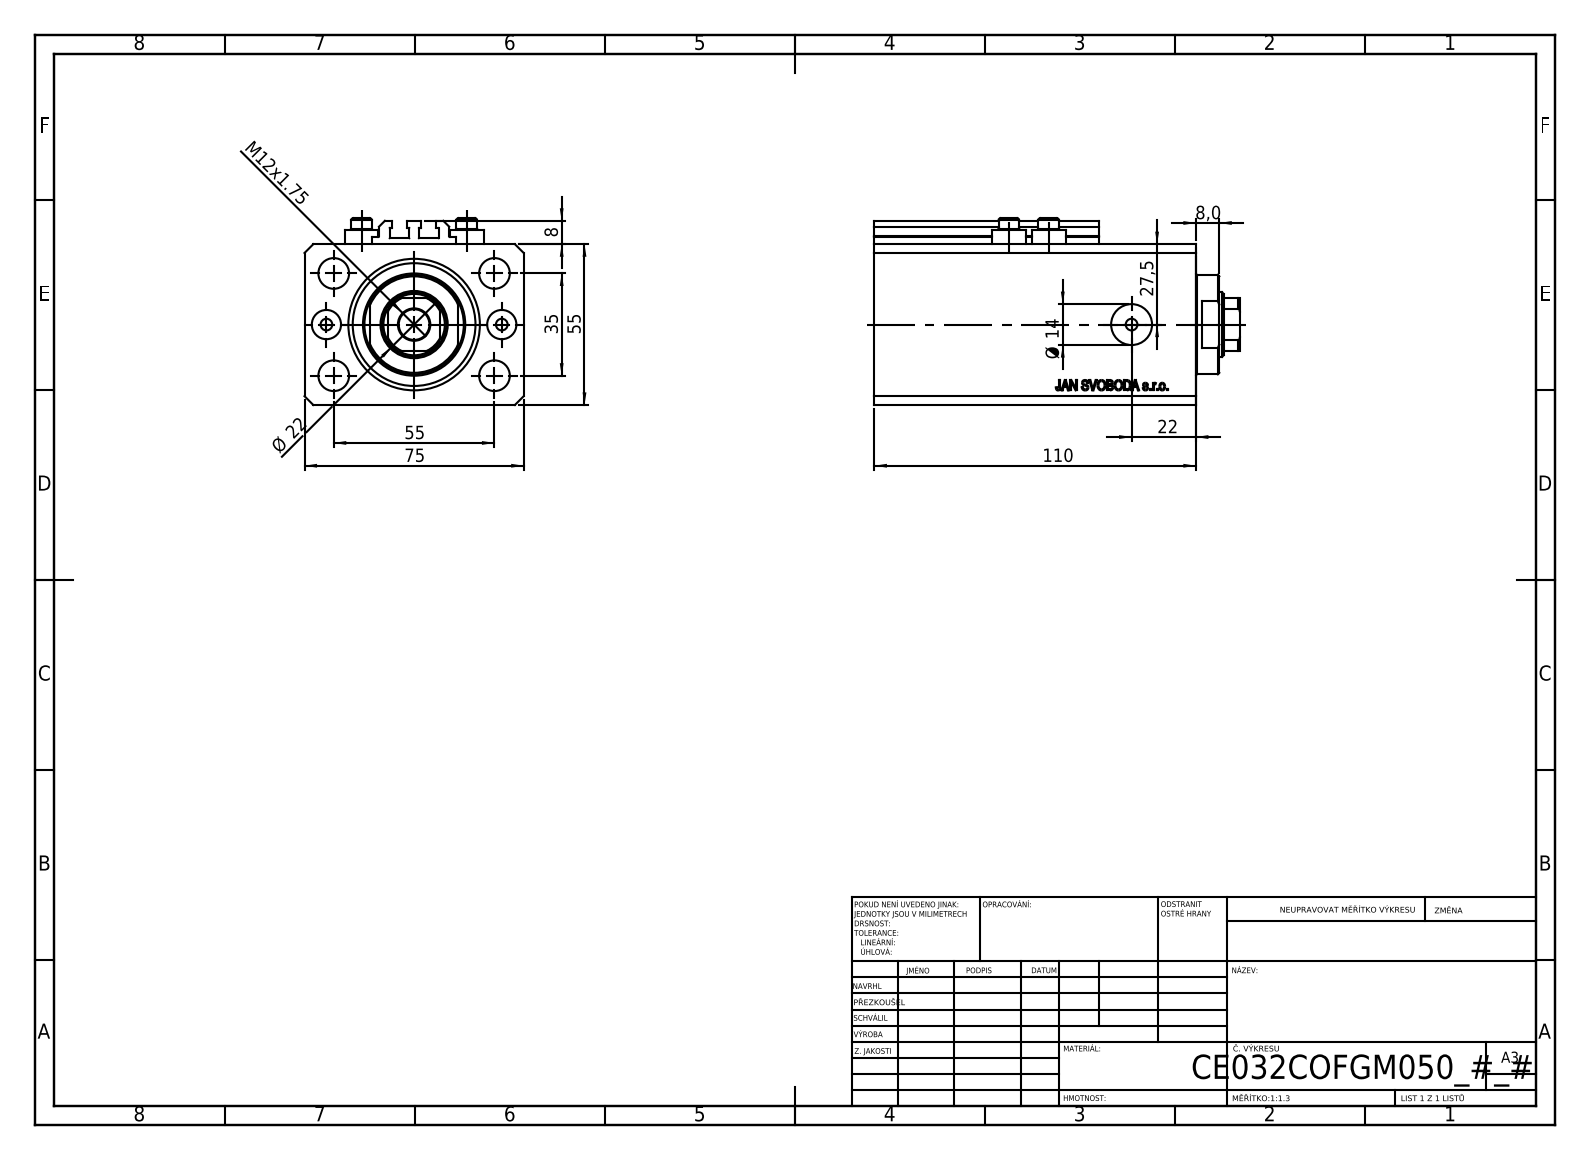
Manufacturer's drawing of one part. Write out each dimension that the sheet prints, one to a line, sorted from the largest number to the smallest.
110
75
55
55
35
27,5
Ø 22
22
Ø 14
M12x1.75
8
8,0
